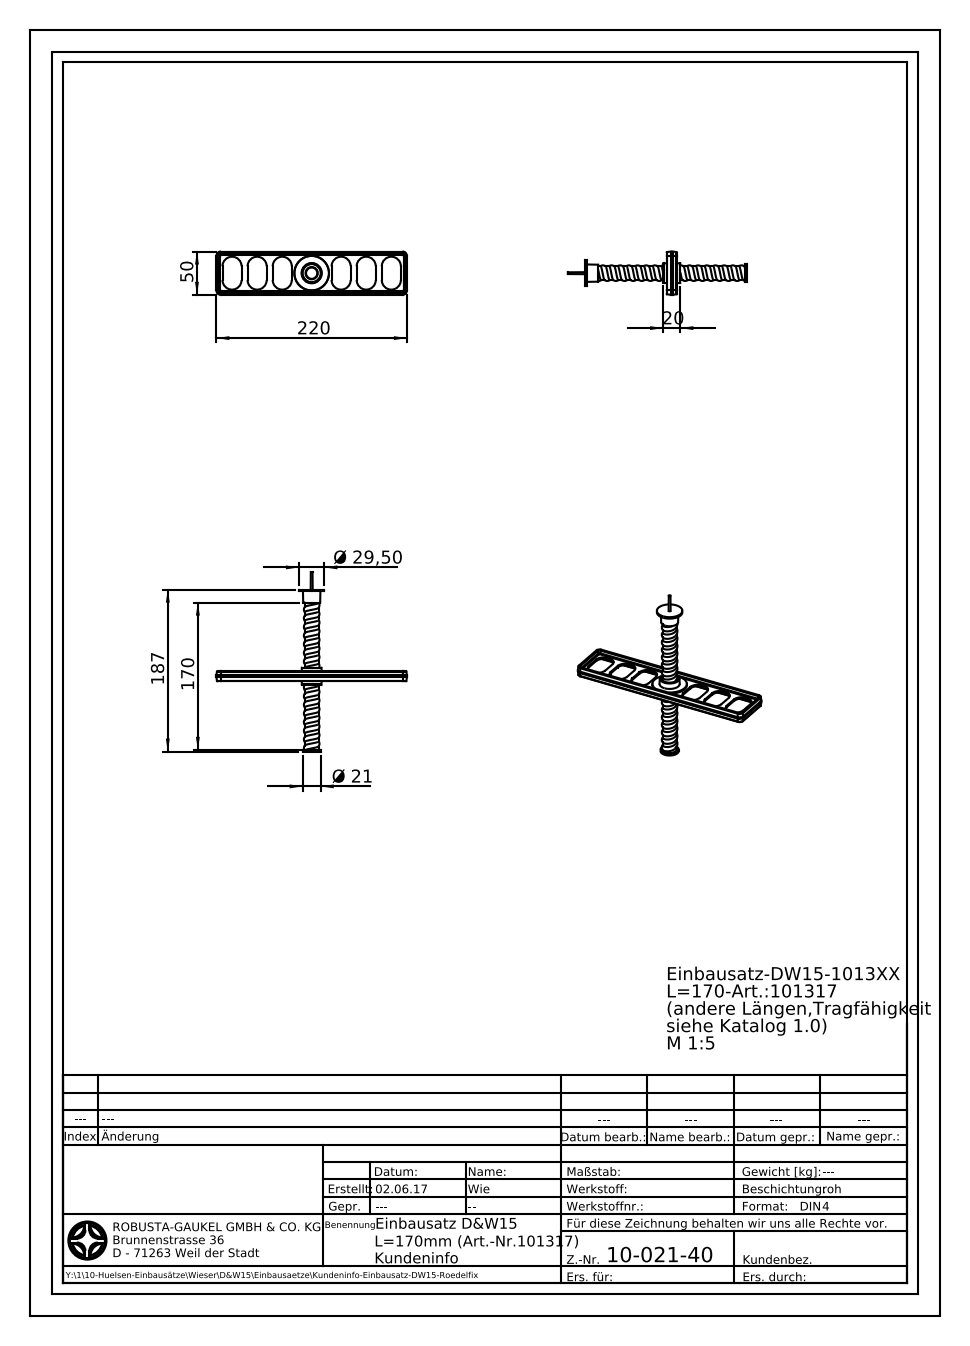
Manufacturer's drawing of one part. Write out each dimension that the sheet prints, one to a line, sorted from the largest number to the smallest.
220
187
170
50
Ø 29,50
Ø 21
20
